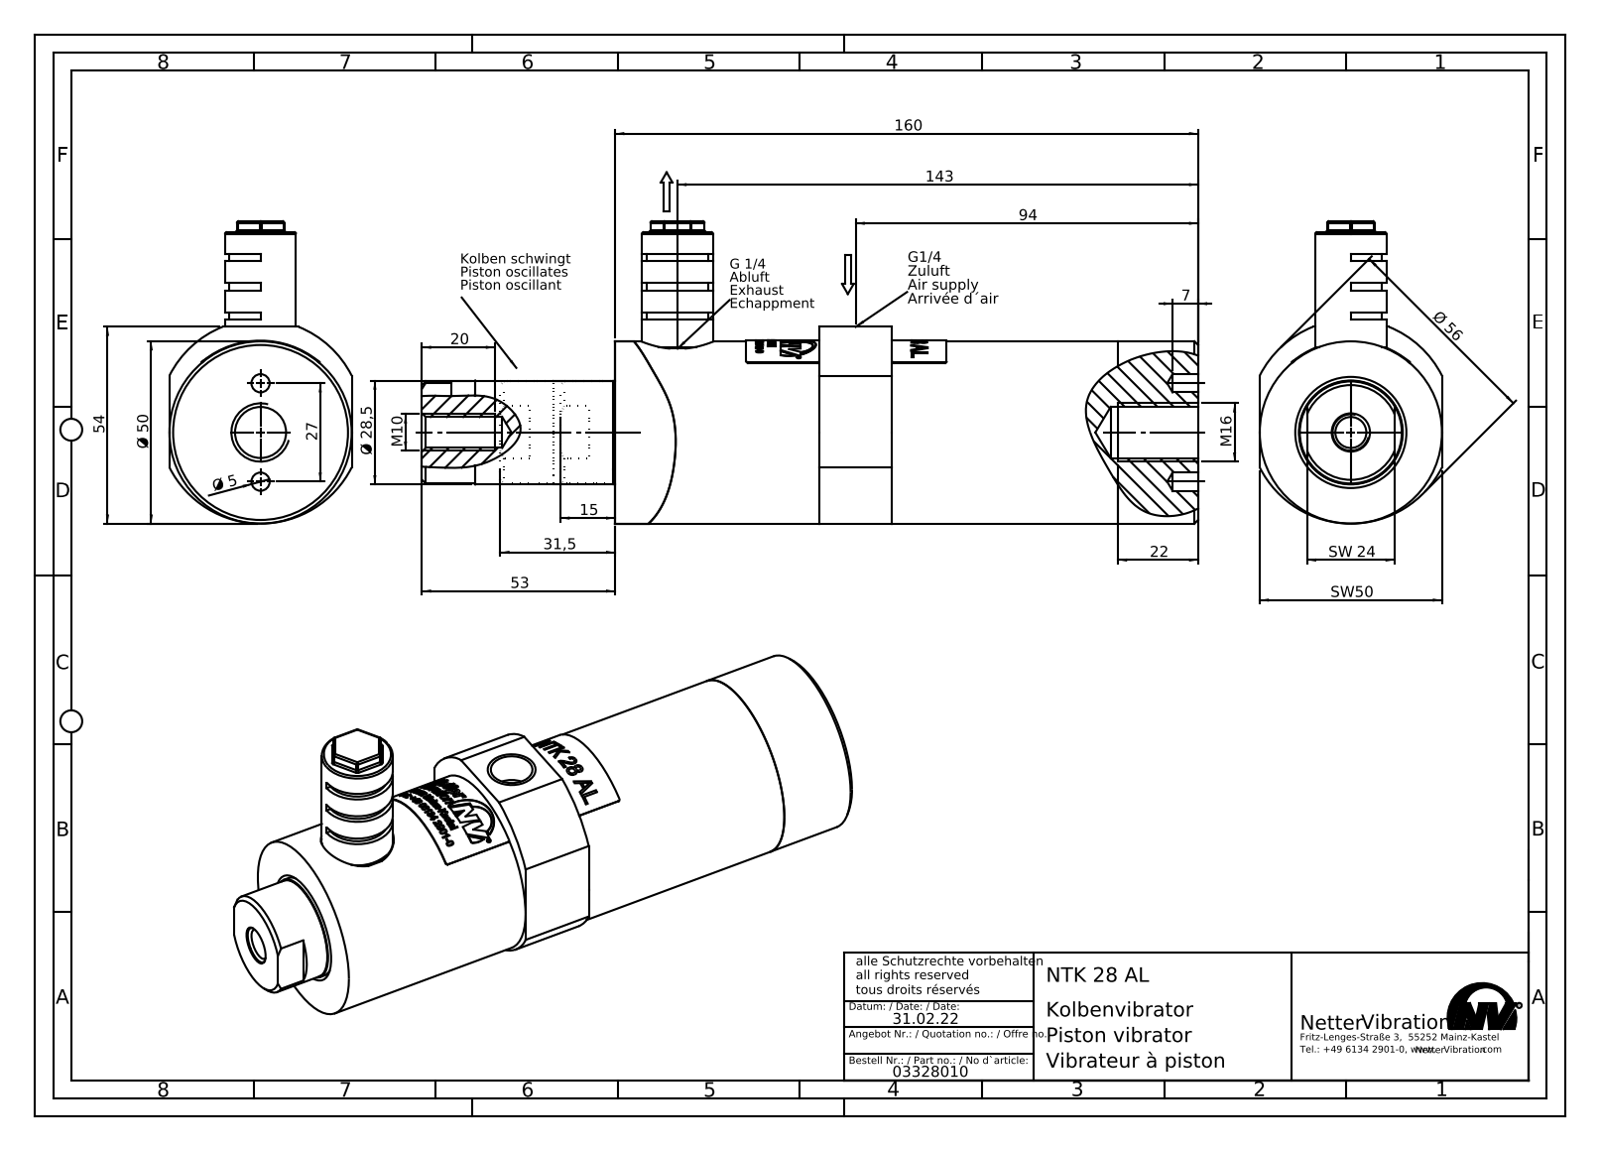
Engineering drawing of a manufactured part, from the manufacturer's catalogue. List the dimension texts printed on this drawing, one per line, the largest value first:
160
143
94
Ø 56
54
53
SW 50
Ø 50
31,5
Ø 28,5
27
SW 24
22
20
M 16
15
M 10
7
Ø 5
